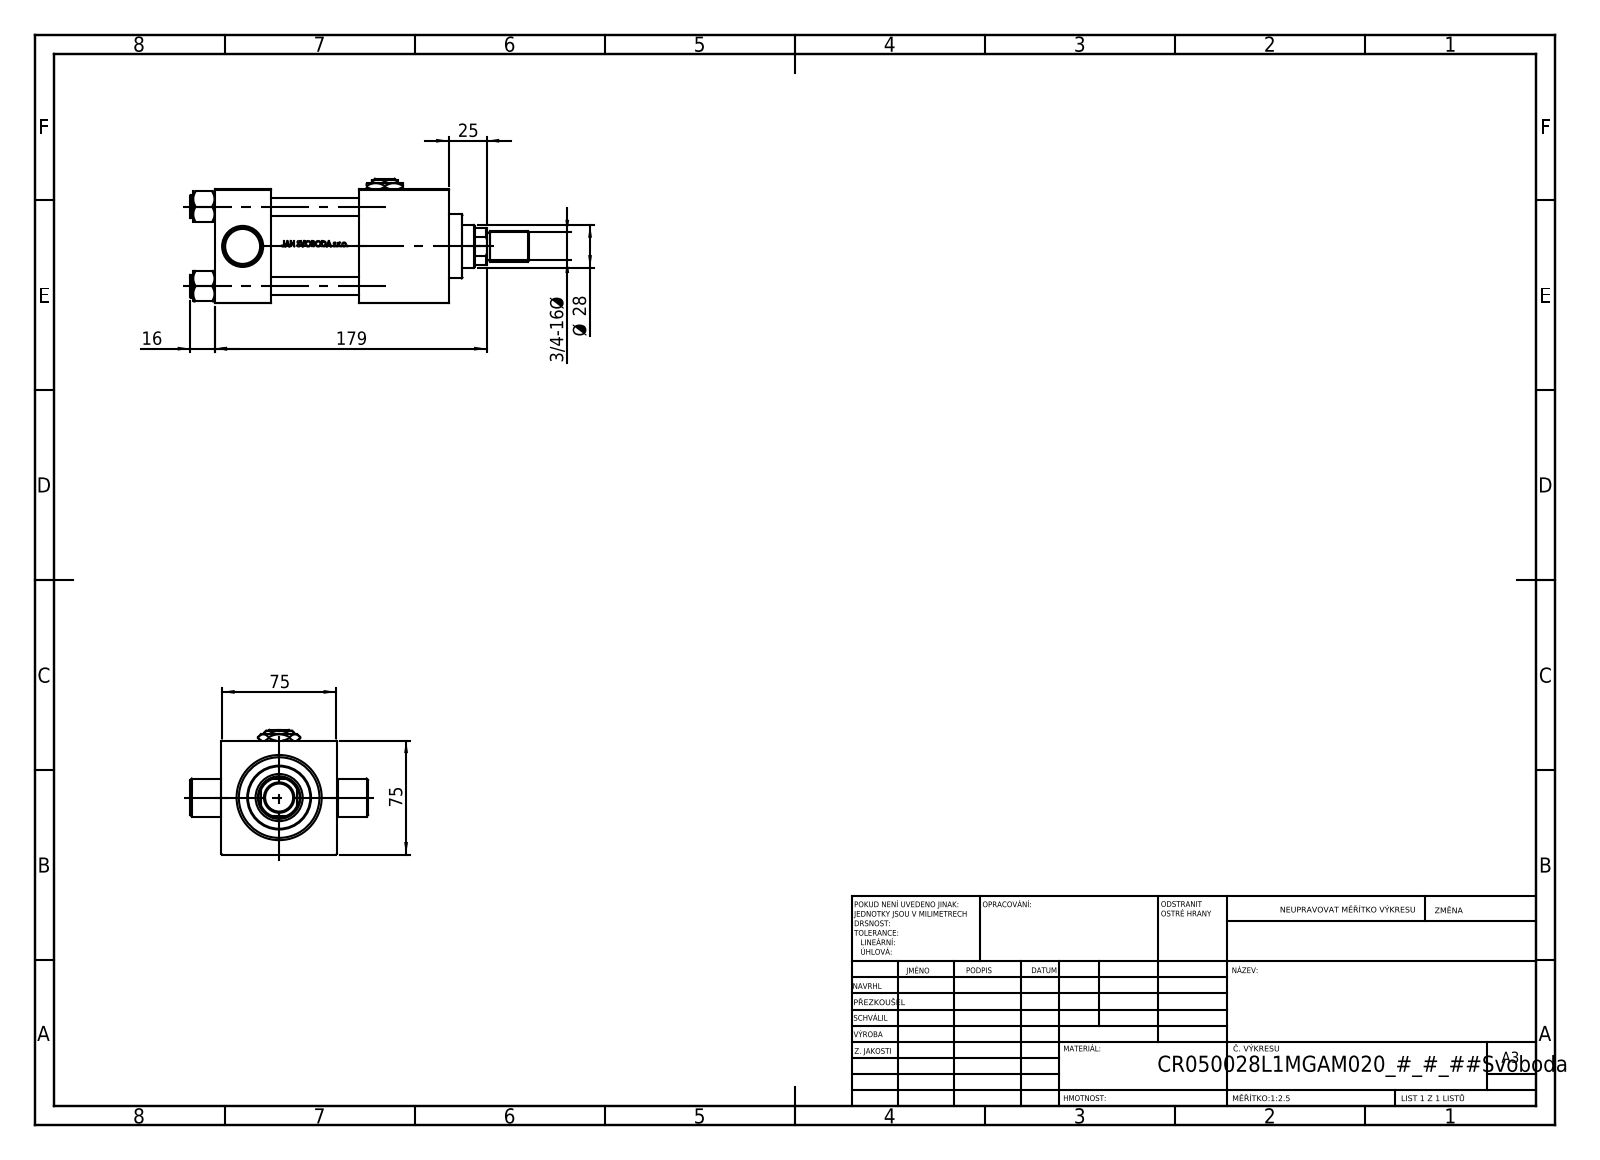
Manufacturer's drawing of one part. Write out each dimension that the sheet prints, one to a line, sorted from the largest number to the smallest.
179
75
75
Ø 28
25
16
3/4-16 Ø
